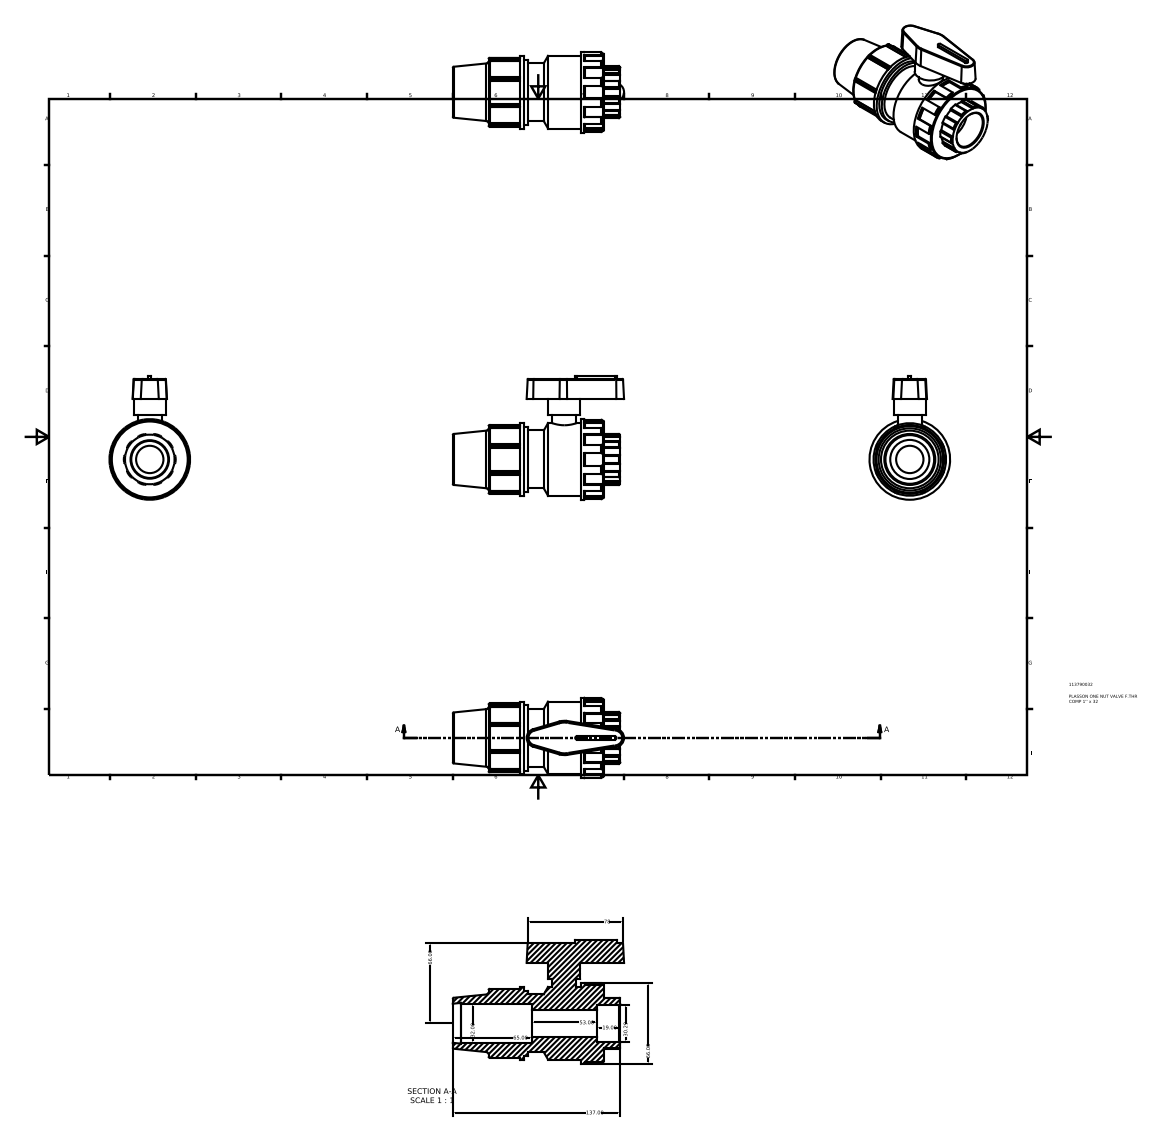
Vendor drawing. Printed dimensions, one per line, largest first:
137.00
78
66.00
66.00
65.00
53.00
32.00
30.29
19.00
